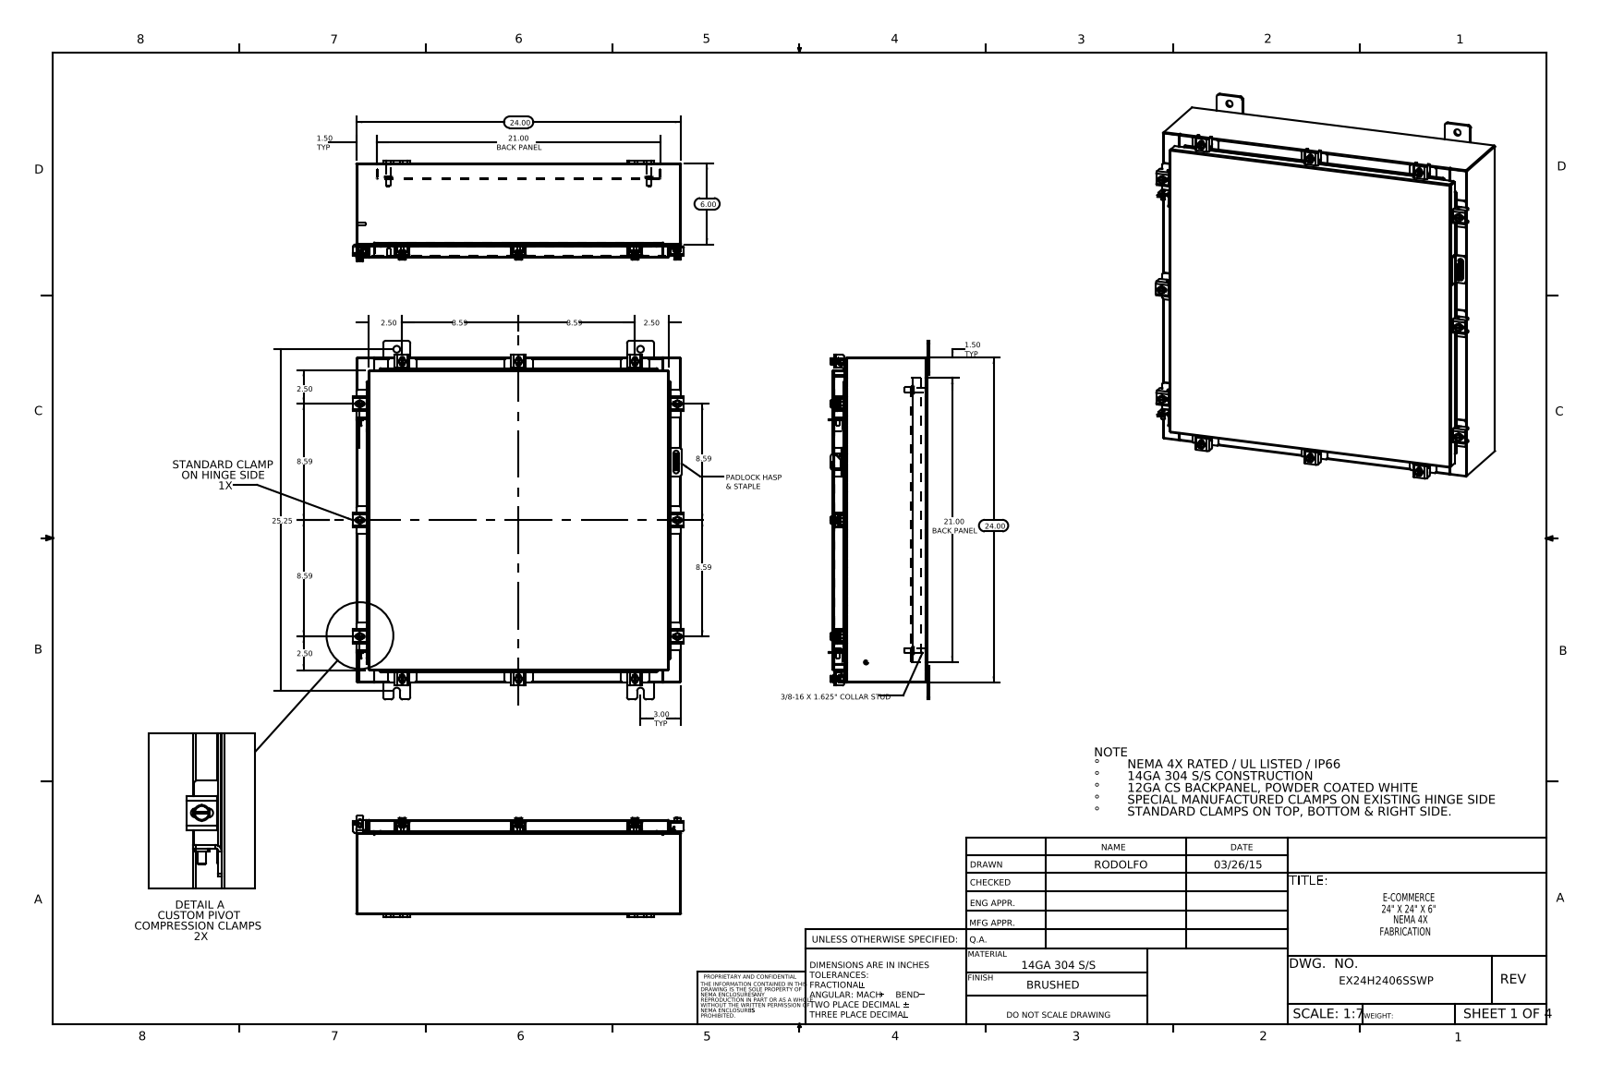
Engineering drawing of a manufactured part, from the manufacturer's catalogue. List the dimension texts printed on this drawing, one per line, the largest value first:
25.25
24.00
24.00
21.00 BACK PANEL
21.00 BACK PANEL
8.59
8.59
8.59
8.59
8.59
8.59
6.00
3.00 TYP
2.50
2.50
2.50
2.50
1.50 TYP
1.50 TYP
